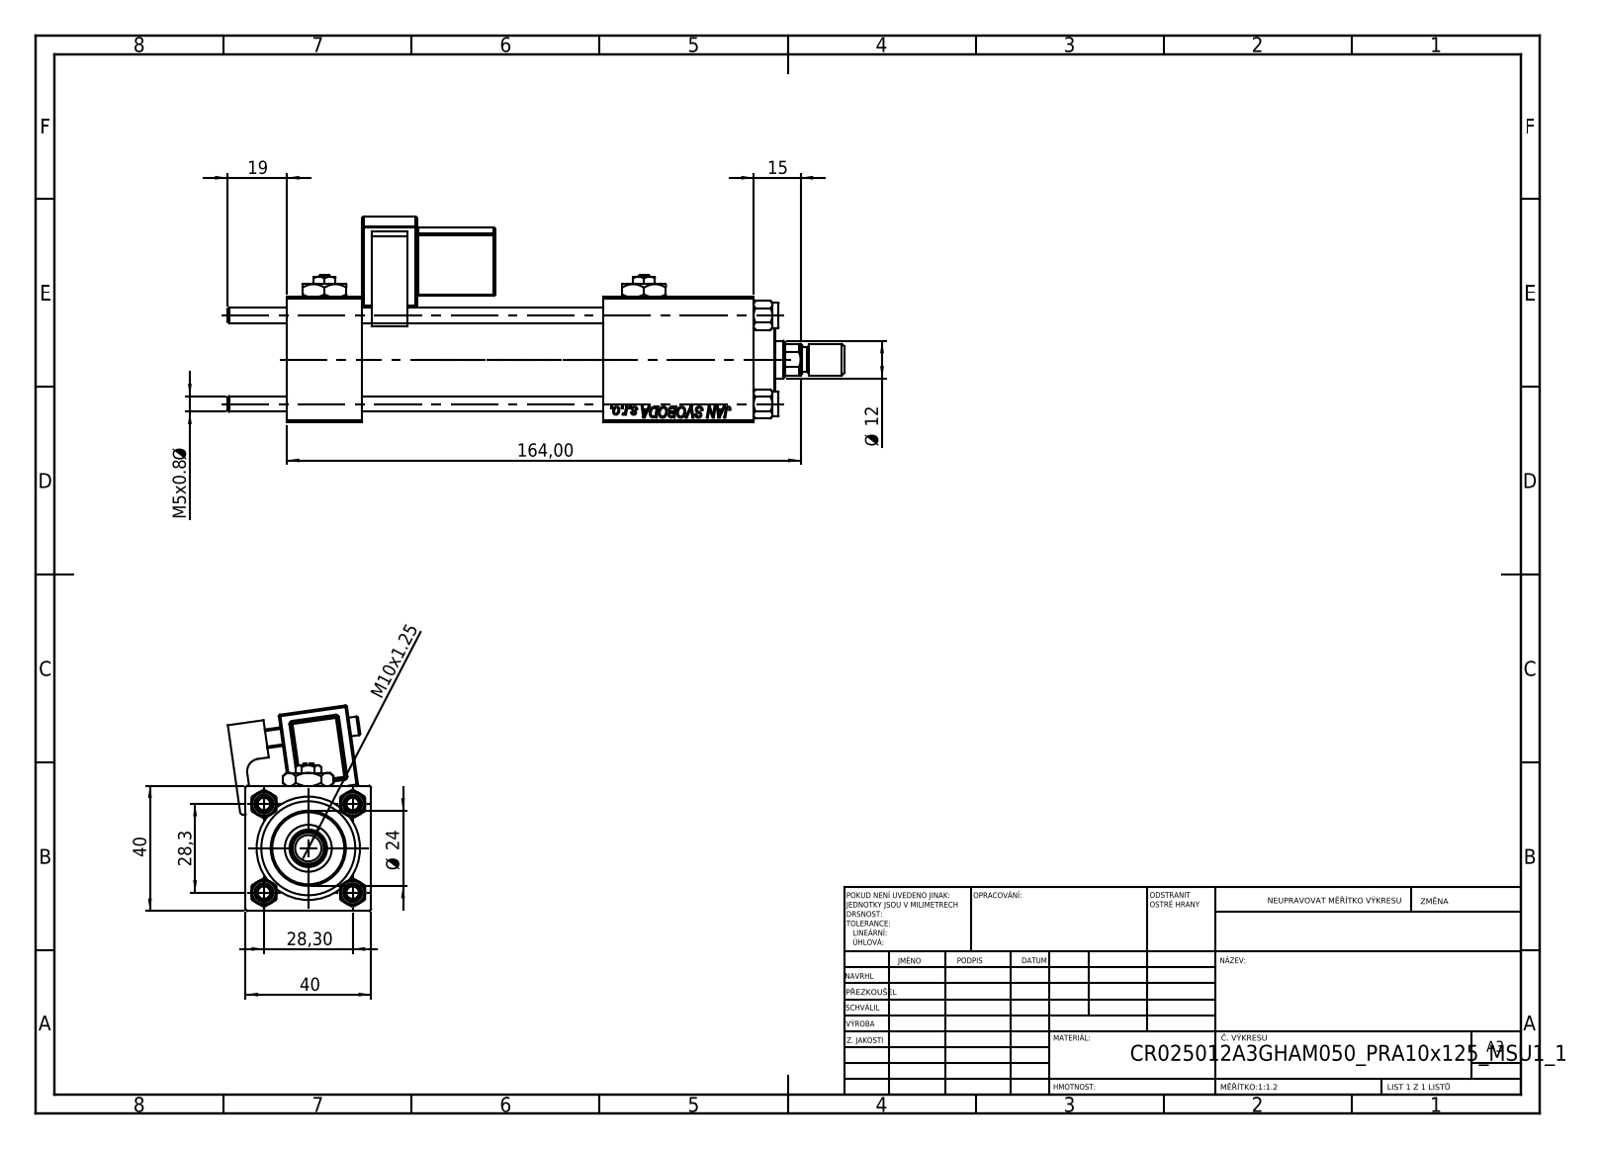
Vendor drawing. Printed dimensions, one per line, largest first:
164,00
40
40
28,3
28,30
Ø 24
19
15
Ø 12
M10x1.25
M5x0.8 Ø
